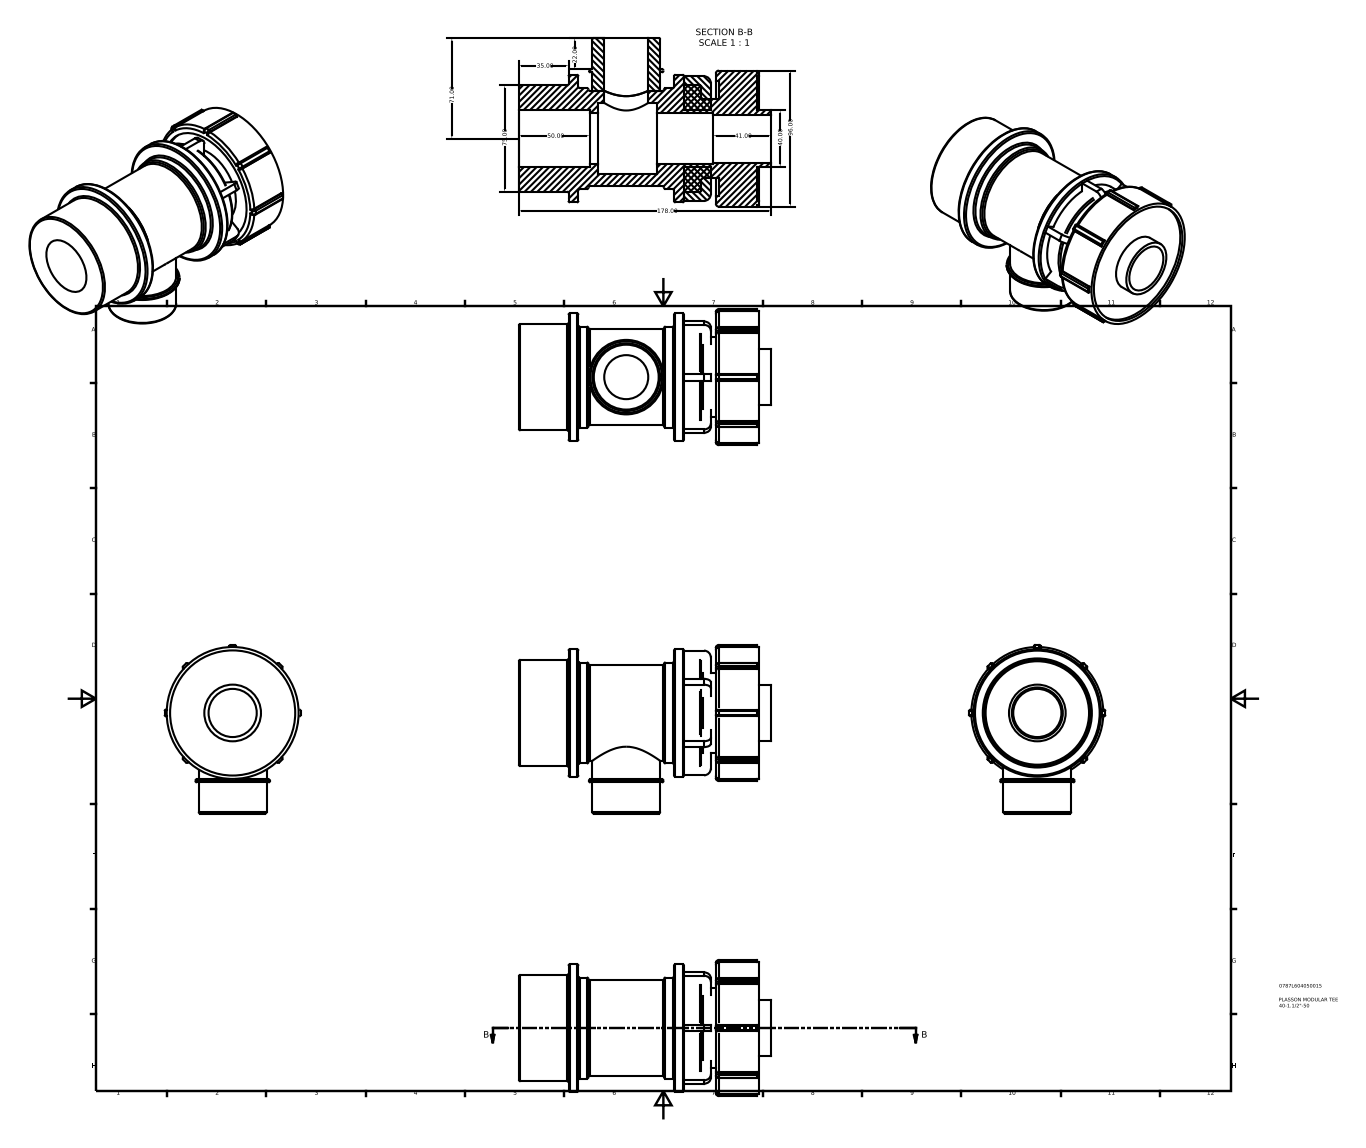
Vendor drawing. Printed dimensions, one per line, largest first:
178.00
96.00
75.00
71.00
50.00
41.00
40.00
35.00
22.00
